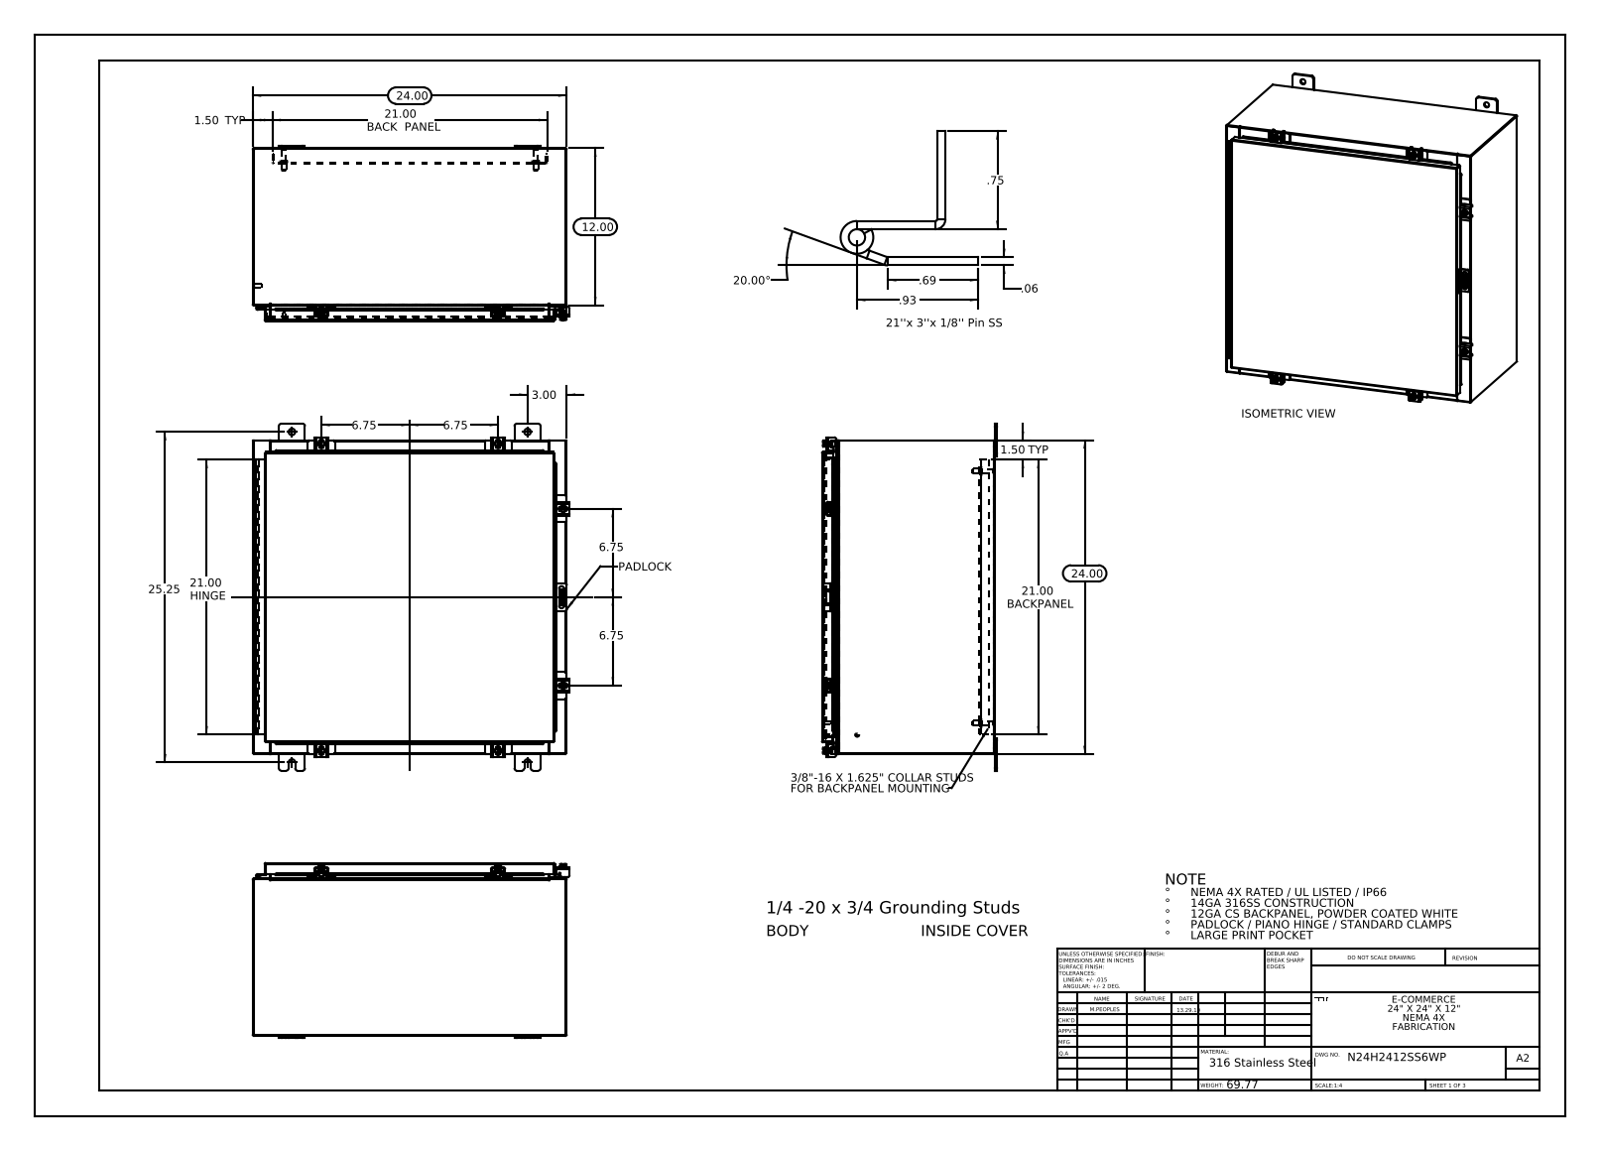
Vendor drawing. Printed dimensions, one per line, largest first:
25.25
24.00
24.00
21.00 HINGE
21.00 BACK PANEL
21.00 BACKPANEL
20.00°
12.00
6.75
6.75
6.75
6.75
3.00
1.50 TYP
1.50 TYP
.93
.75
.69
.06
